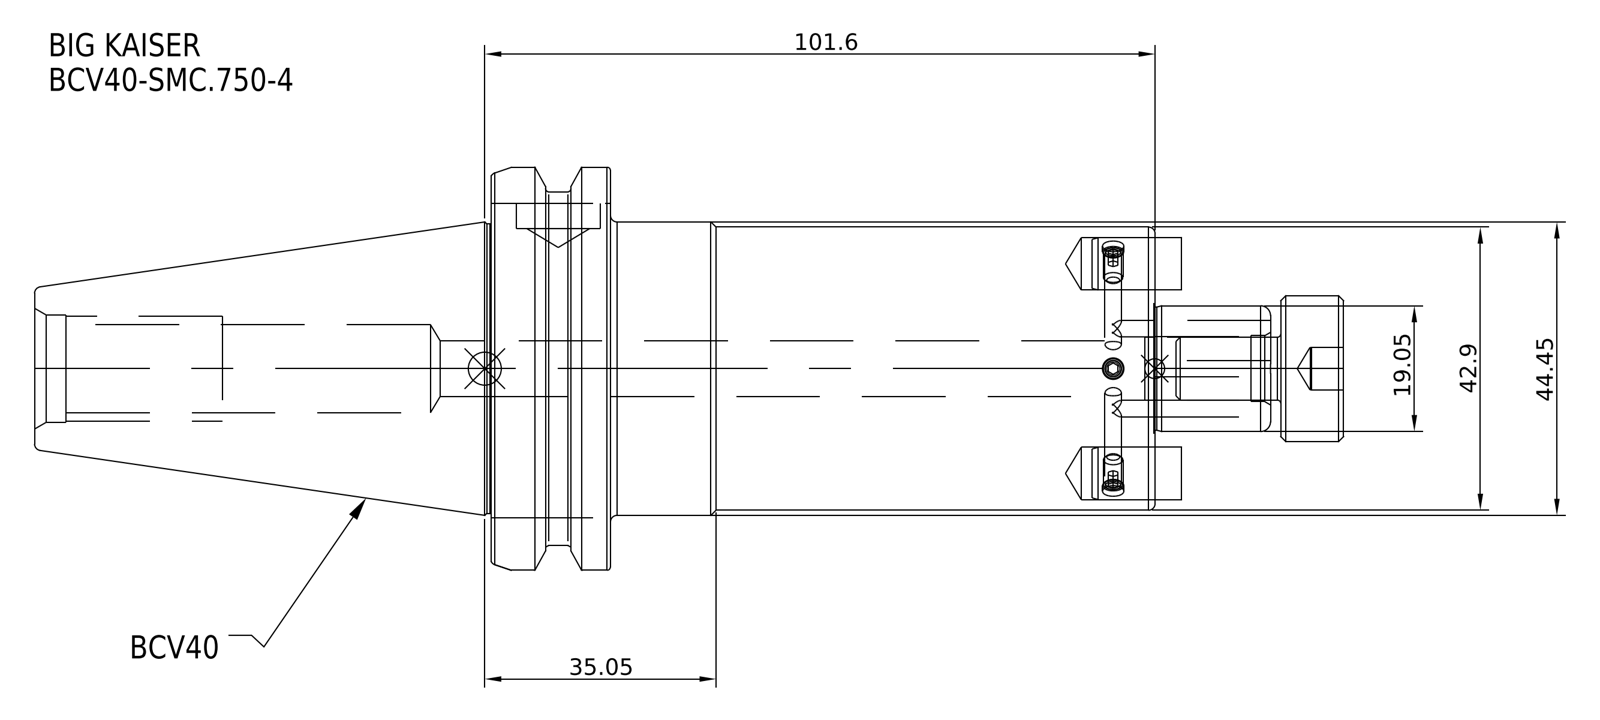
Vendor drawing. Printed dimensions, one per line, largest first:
101.6
44.45
42.9
35.05
19.05
